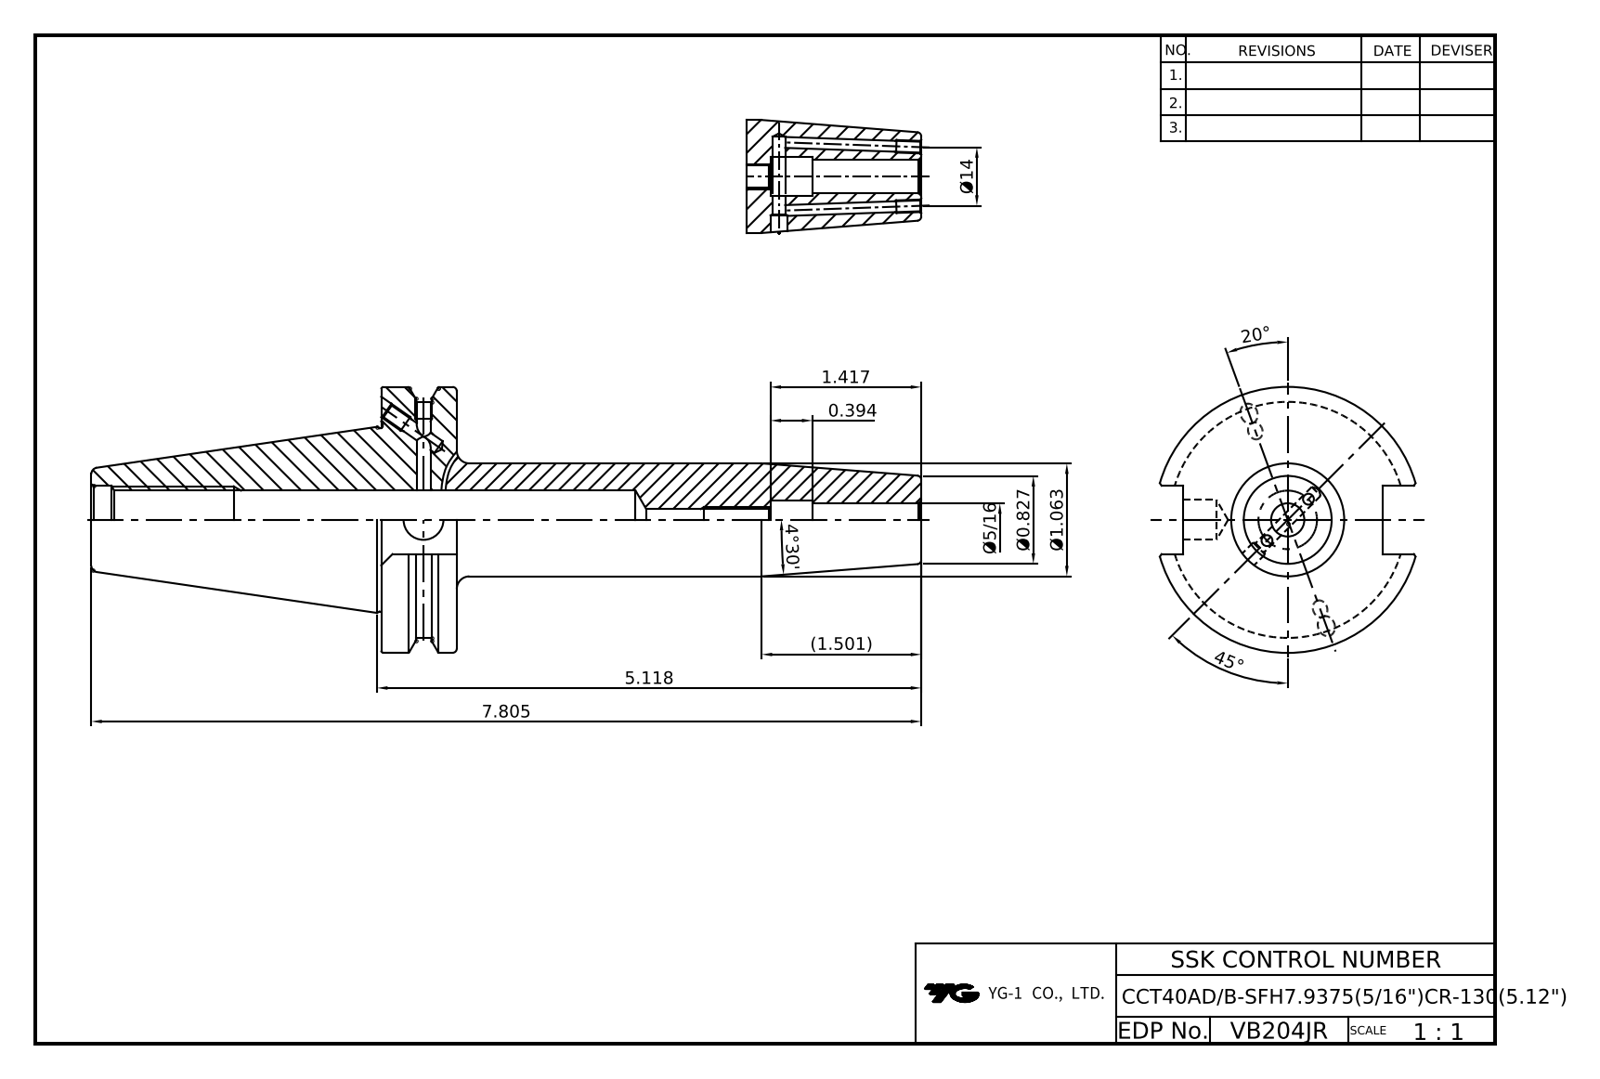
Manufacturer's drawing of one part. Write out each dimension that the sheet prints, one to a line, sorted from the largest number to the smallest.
45°
20°
Ø14
7.805
5.118
4°30'
(1.501)
1.417
Ø1.063
Ø0.827
0.394
Ø5/16
